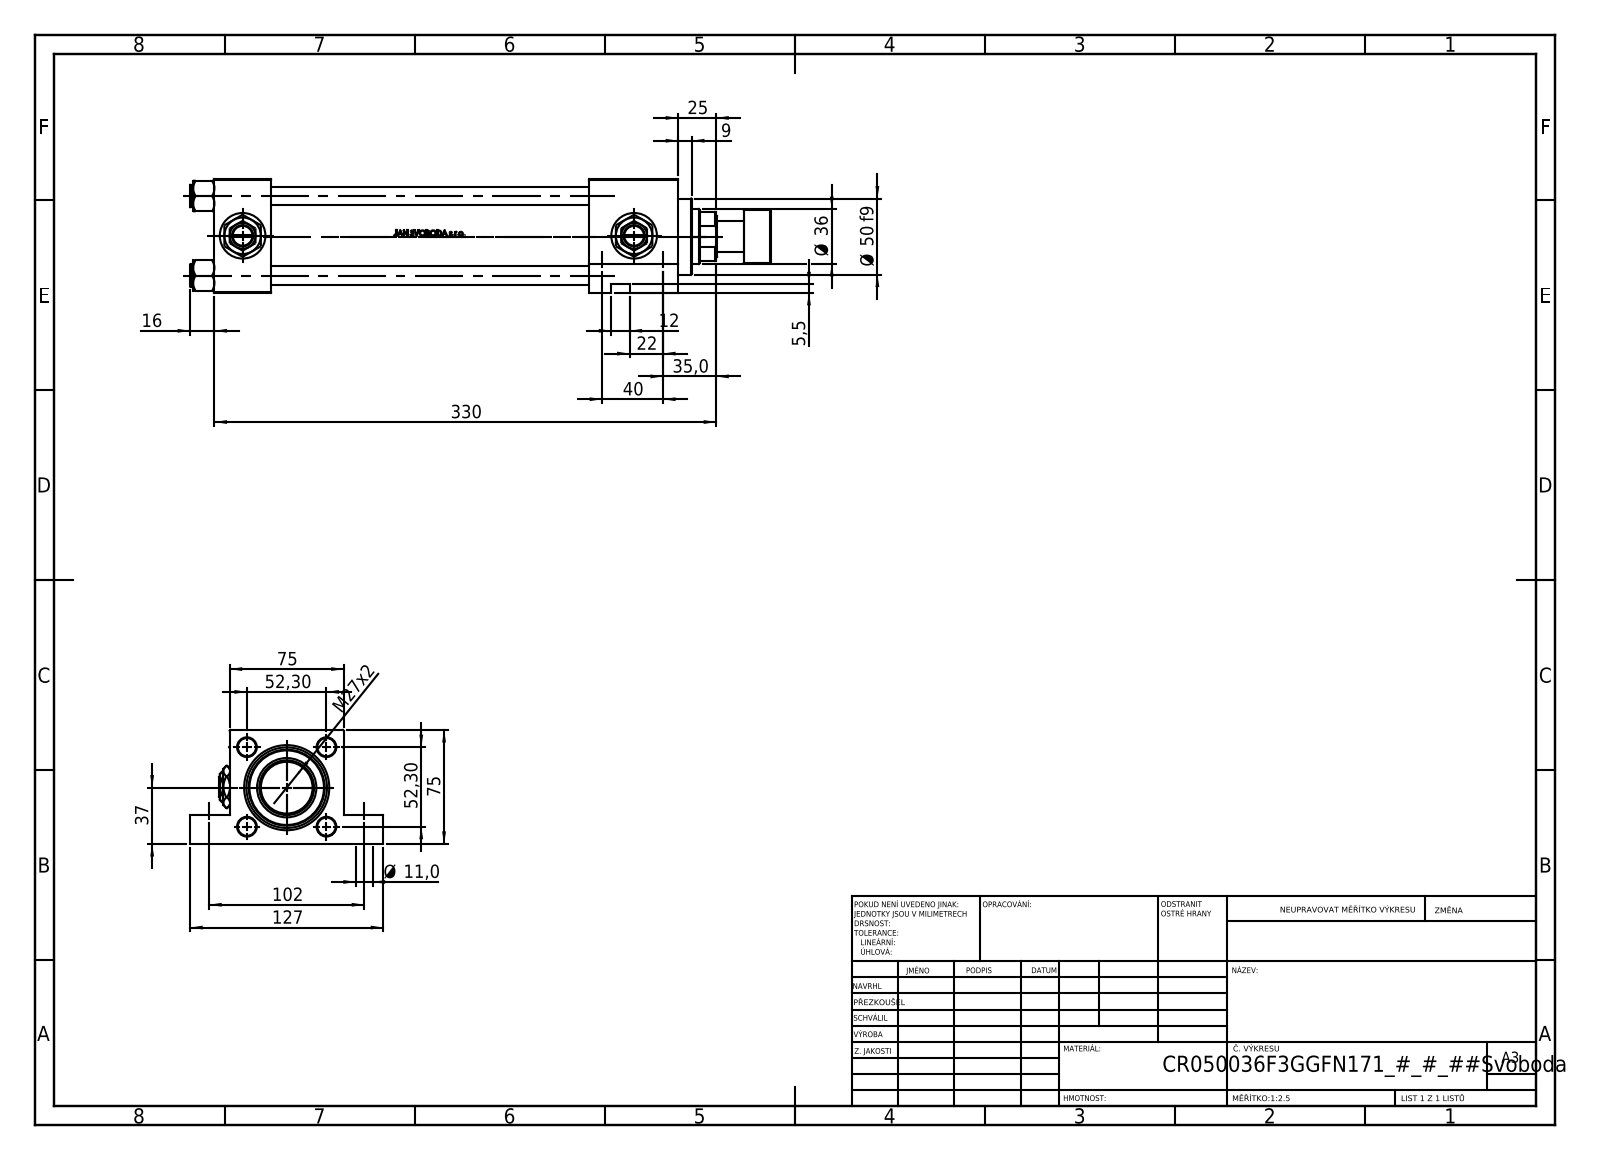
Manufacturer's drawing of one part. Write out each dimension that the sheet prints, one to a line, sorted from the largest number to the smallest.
330
127
102
75
75
52,30
52,30
Ø 50 f9
40
37
Ø 36
35,0
M27x2
25
22
16
12
Ø 11,0
9
5,5
